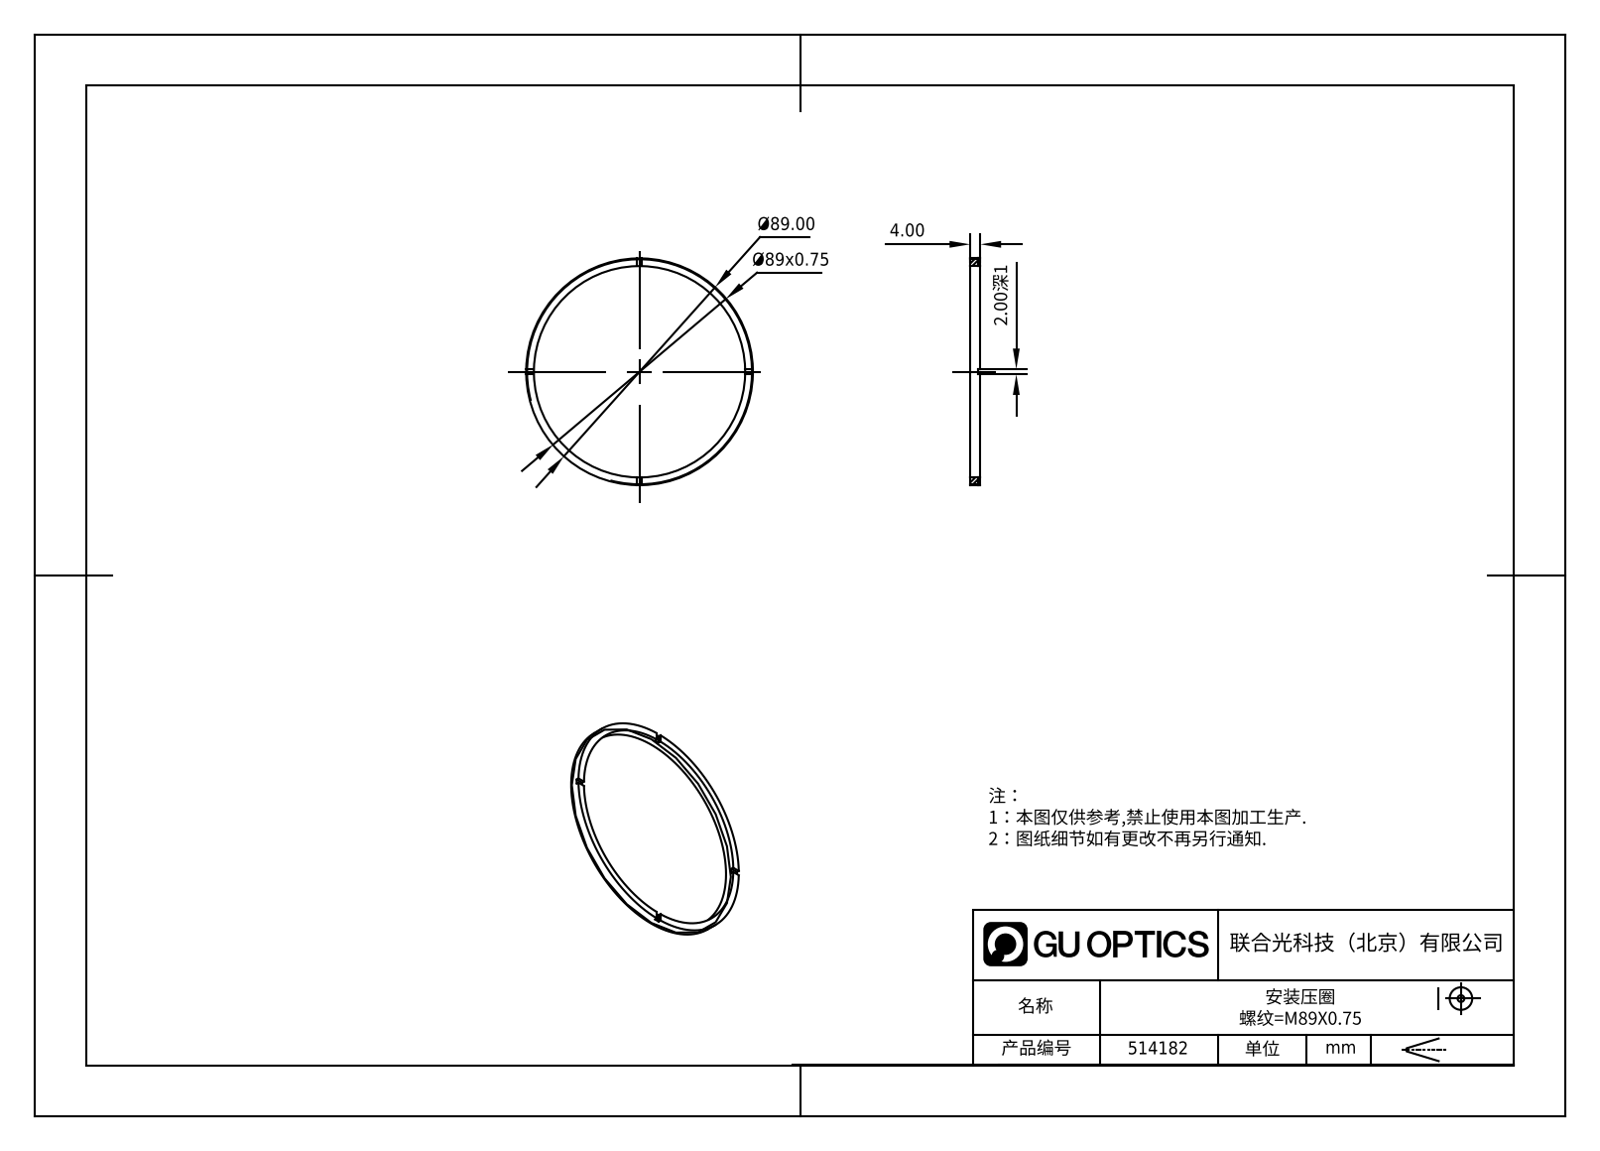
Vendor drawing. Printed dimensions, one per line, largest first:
Ø89.00
Ø89x0.75
4.00
2.00深1
